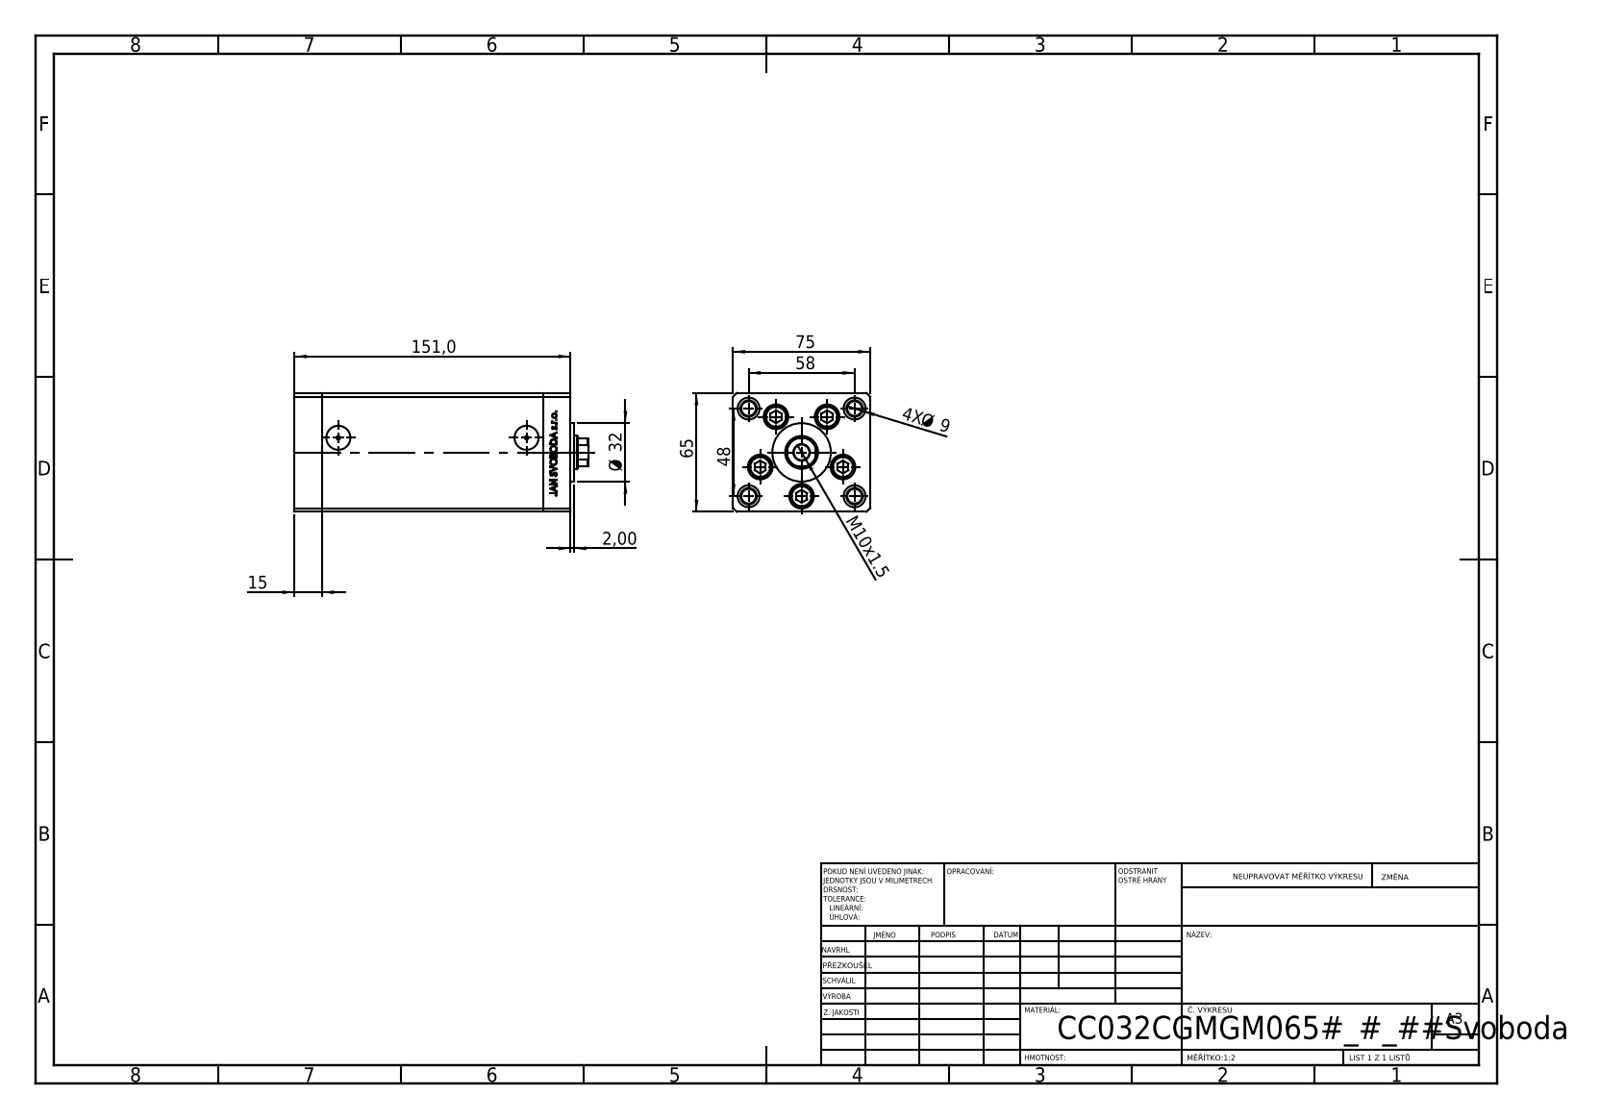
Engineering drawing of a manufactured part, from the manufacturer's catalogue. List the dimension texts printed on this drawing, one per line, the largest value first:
151,0
75
65
58
48
Ø 32
15
M10x1.5
4X Ø 9
2,00
